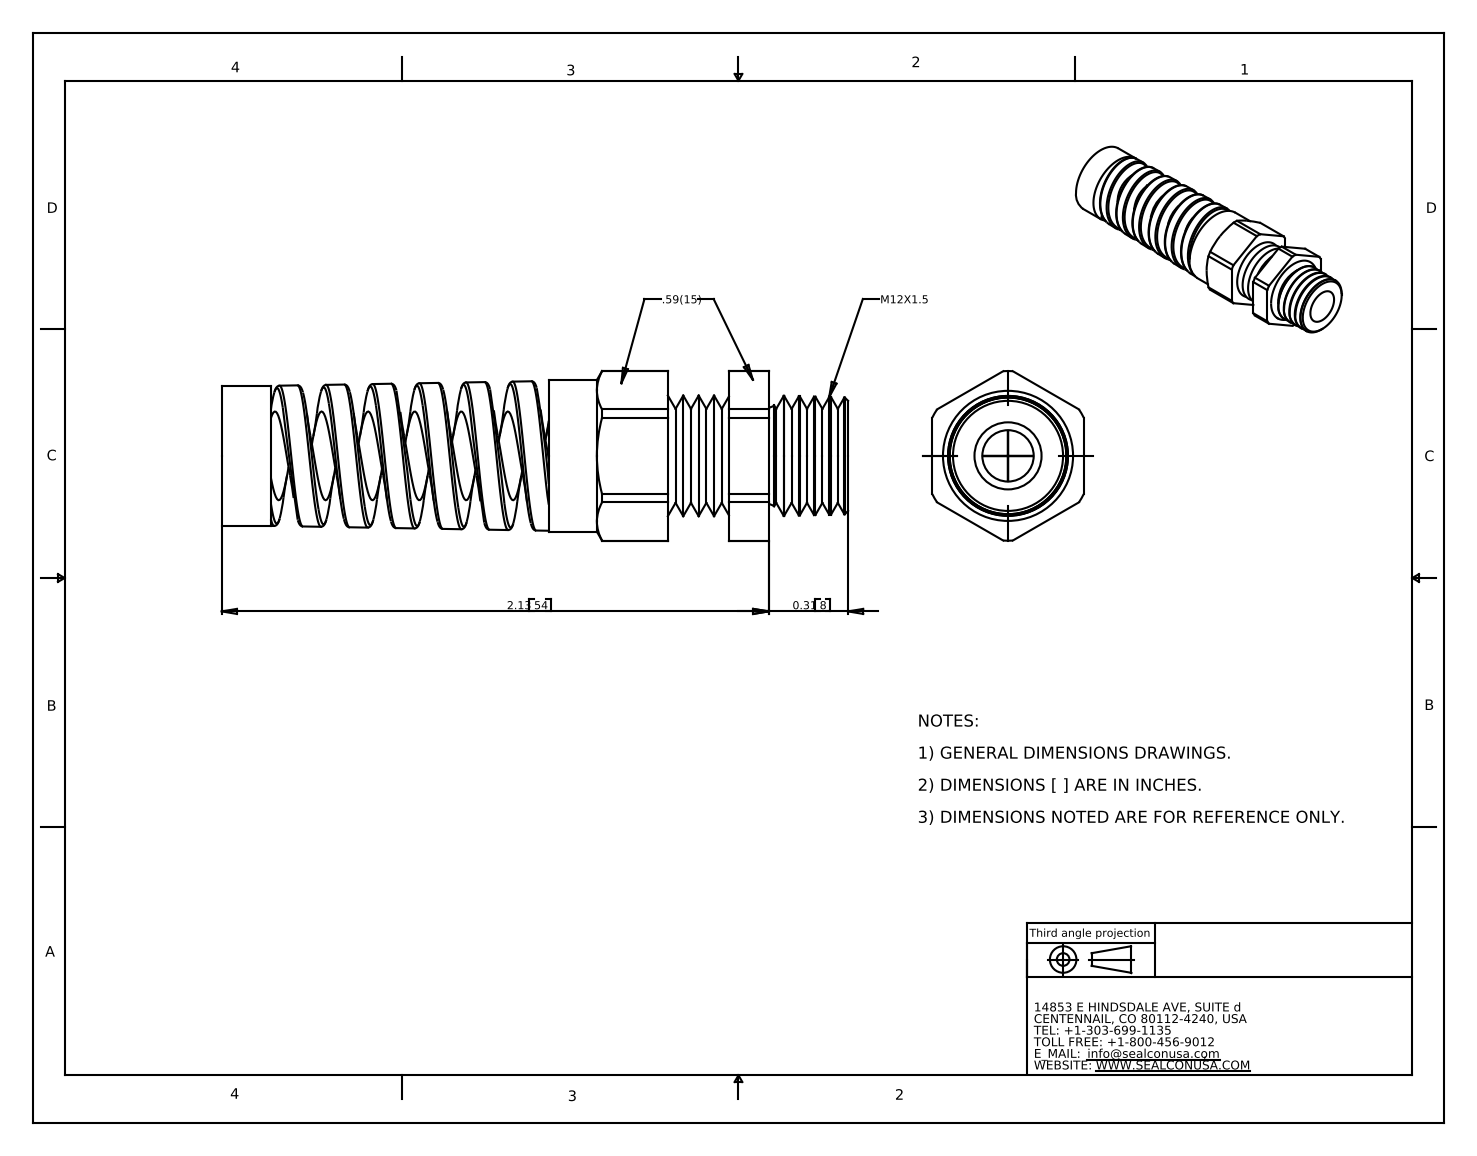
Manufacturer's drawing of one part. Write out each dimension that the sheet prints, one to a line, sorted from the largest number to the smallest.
2.13 54
0.31 8
